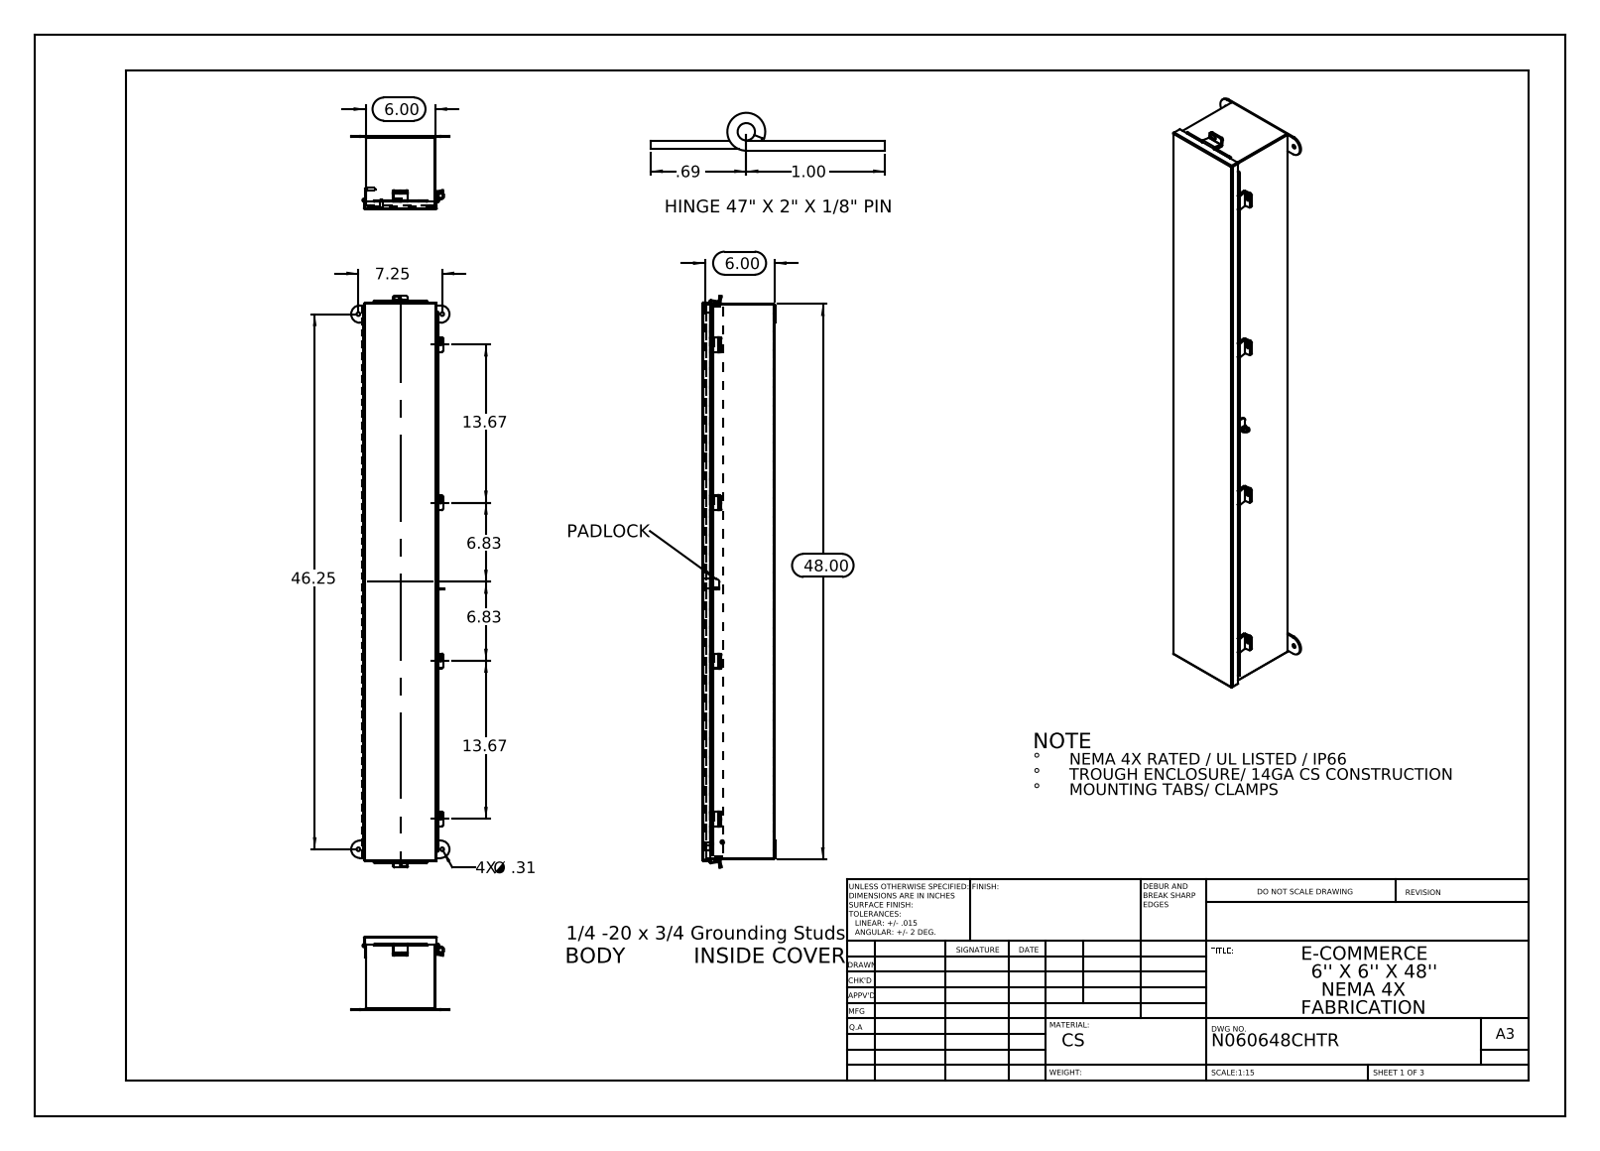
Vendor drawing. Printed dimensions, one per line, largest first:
48.00
46.25
13.67
13.67
7.25
6.83
6.83
6.00
6.00
1.00
.69
4X Ø .31
